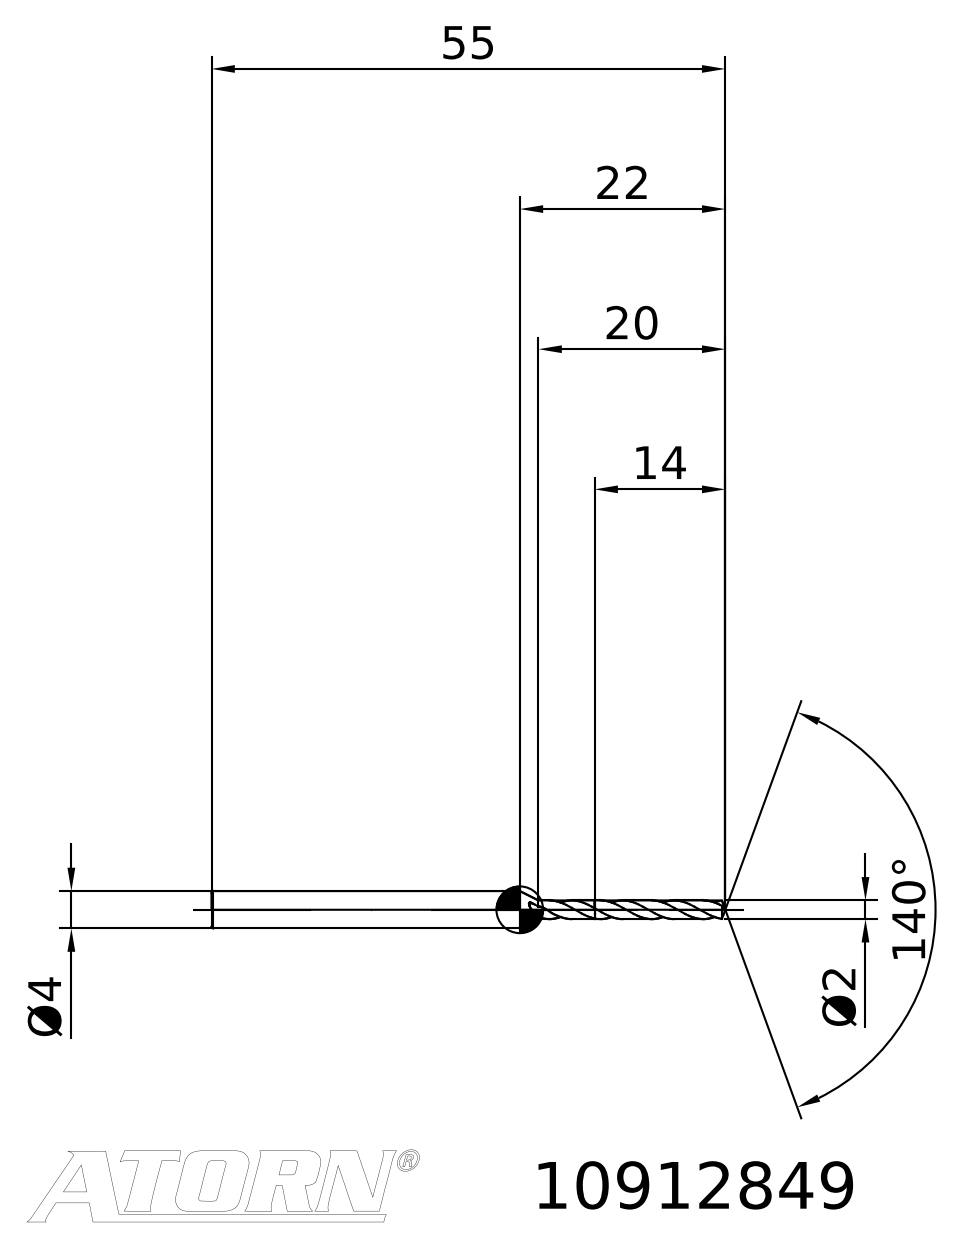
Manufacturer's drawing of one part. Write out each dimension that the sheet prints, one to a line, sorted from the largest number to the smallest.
140°
55
22
20
14
Ø4
Ø2
